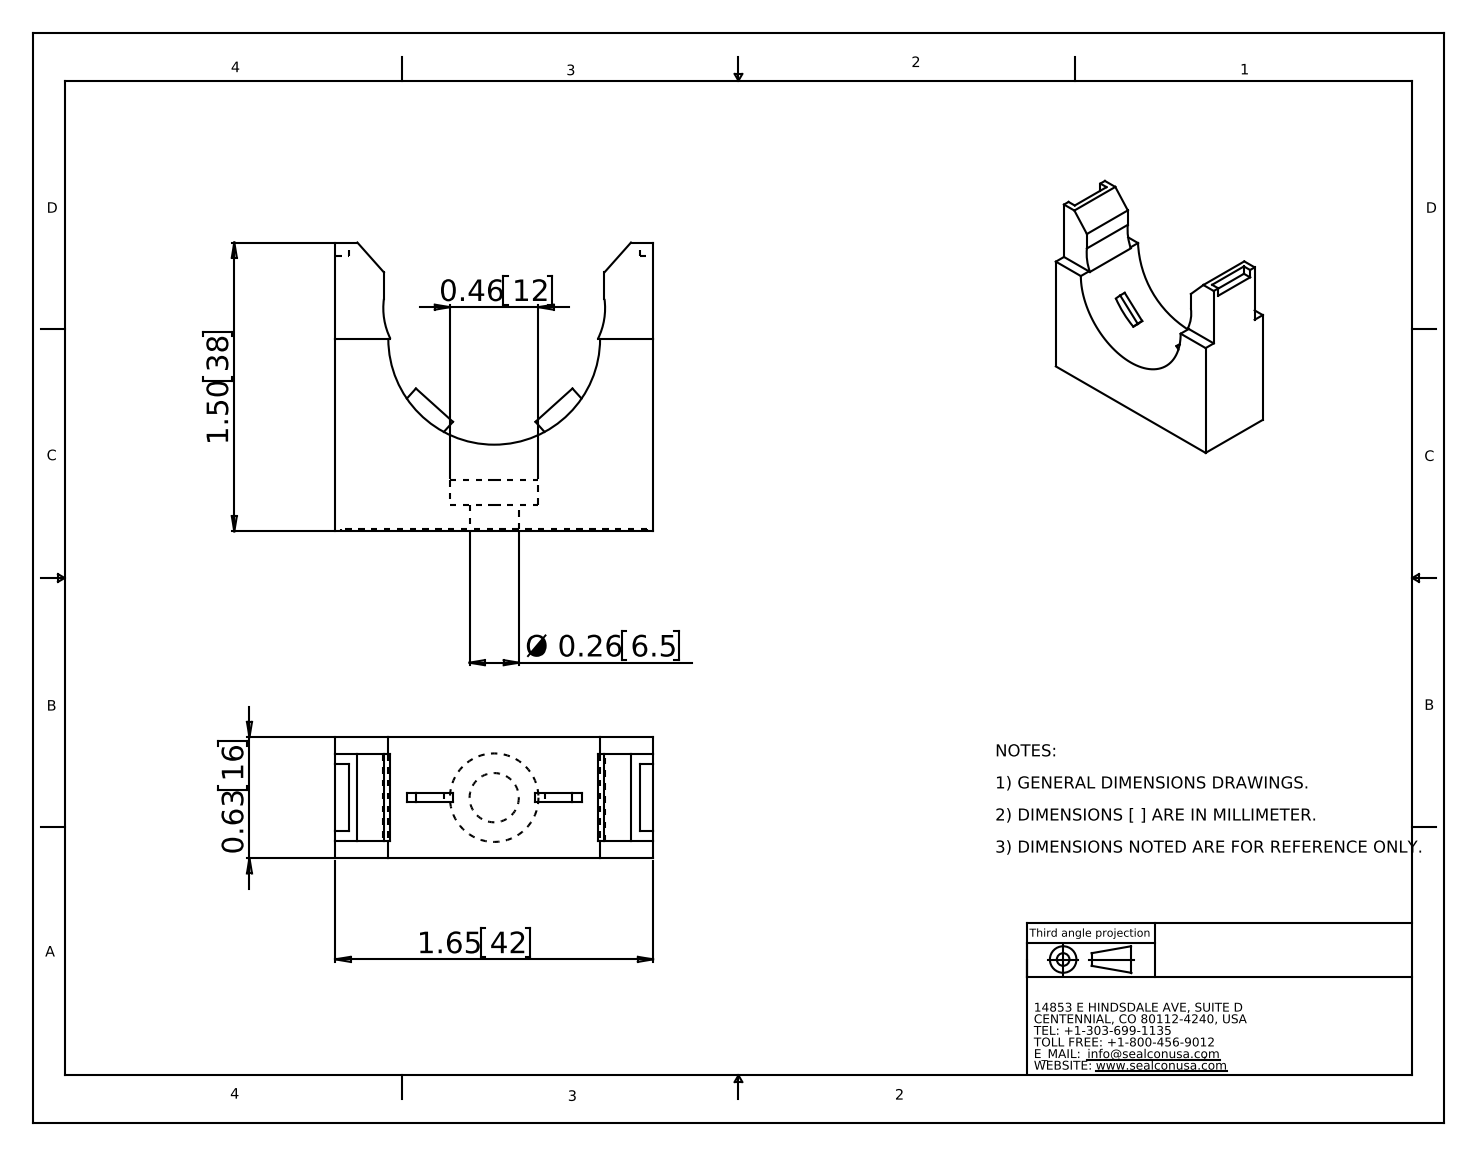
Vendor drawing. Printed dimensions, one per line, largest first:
1.65 42
1.50 38
0.63 16
0.46 12
Ø 0.26 6.5
